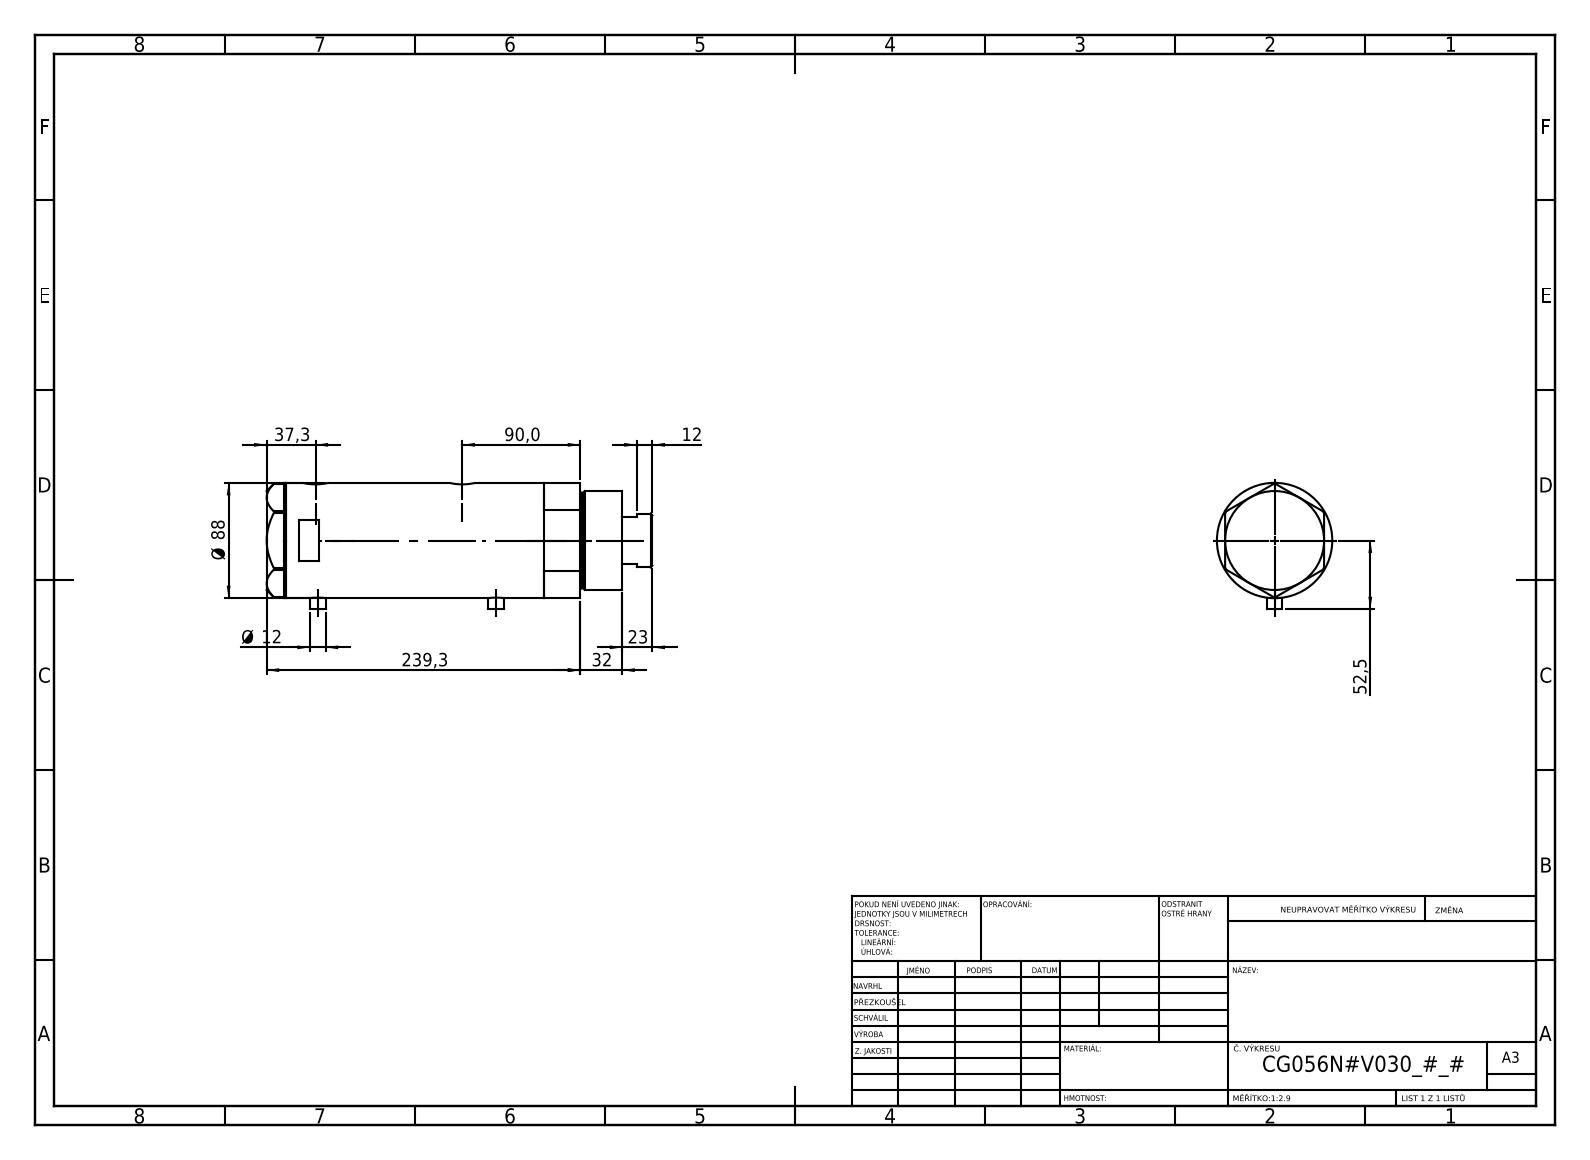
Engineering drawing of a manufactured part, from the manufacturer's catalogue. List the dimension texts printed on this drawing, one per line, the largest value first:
239,3
90,0
Ø 88
52,5
37,3
32
23
12
Ø 12
